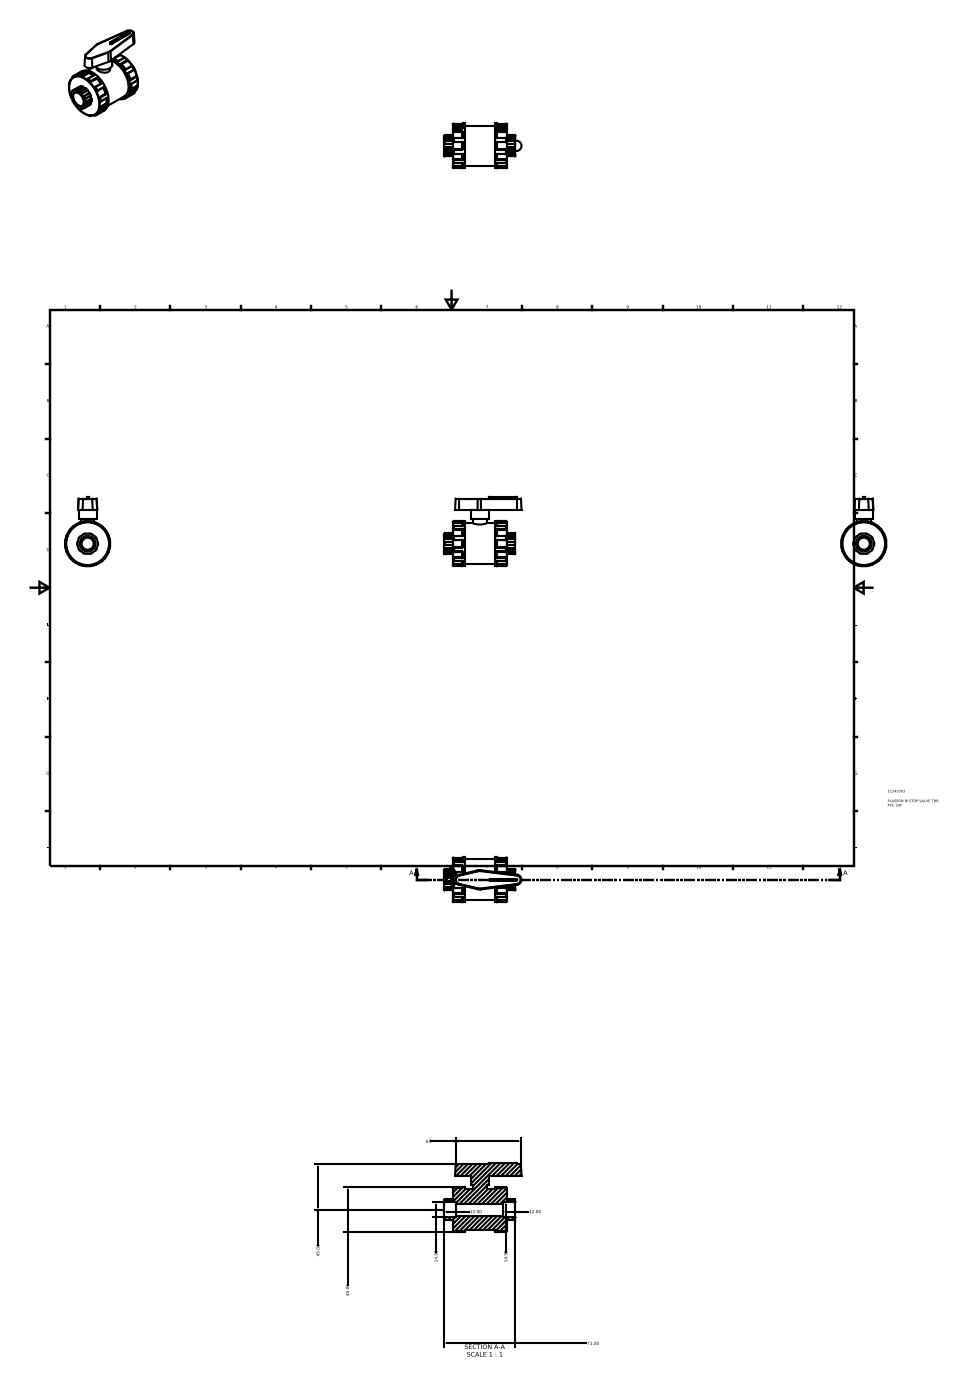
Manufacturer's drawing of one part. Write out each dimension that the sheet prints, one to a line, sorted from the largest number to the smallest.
71.00
65
45.00
45.00
14.95
14.95
12.00
12.00
